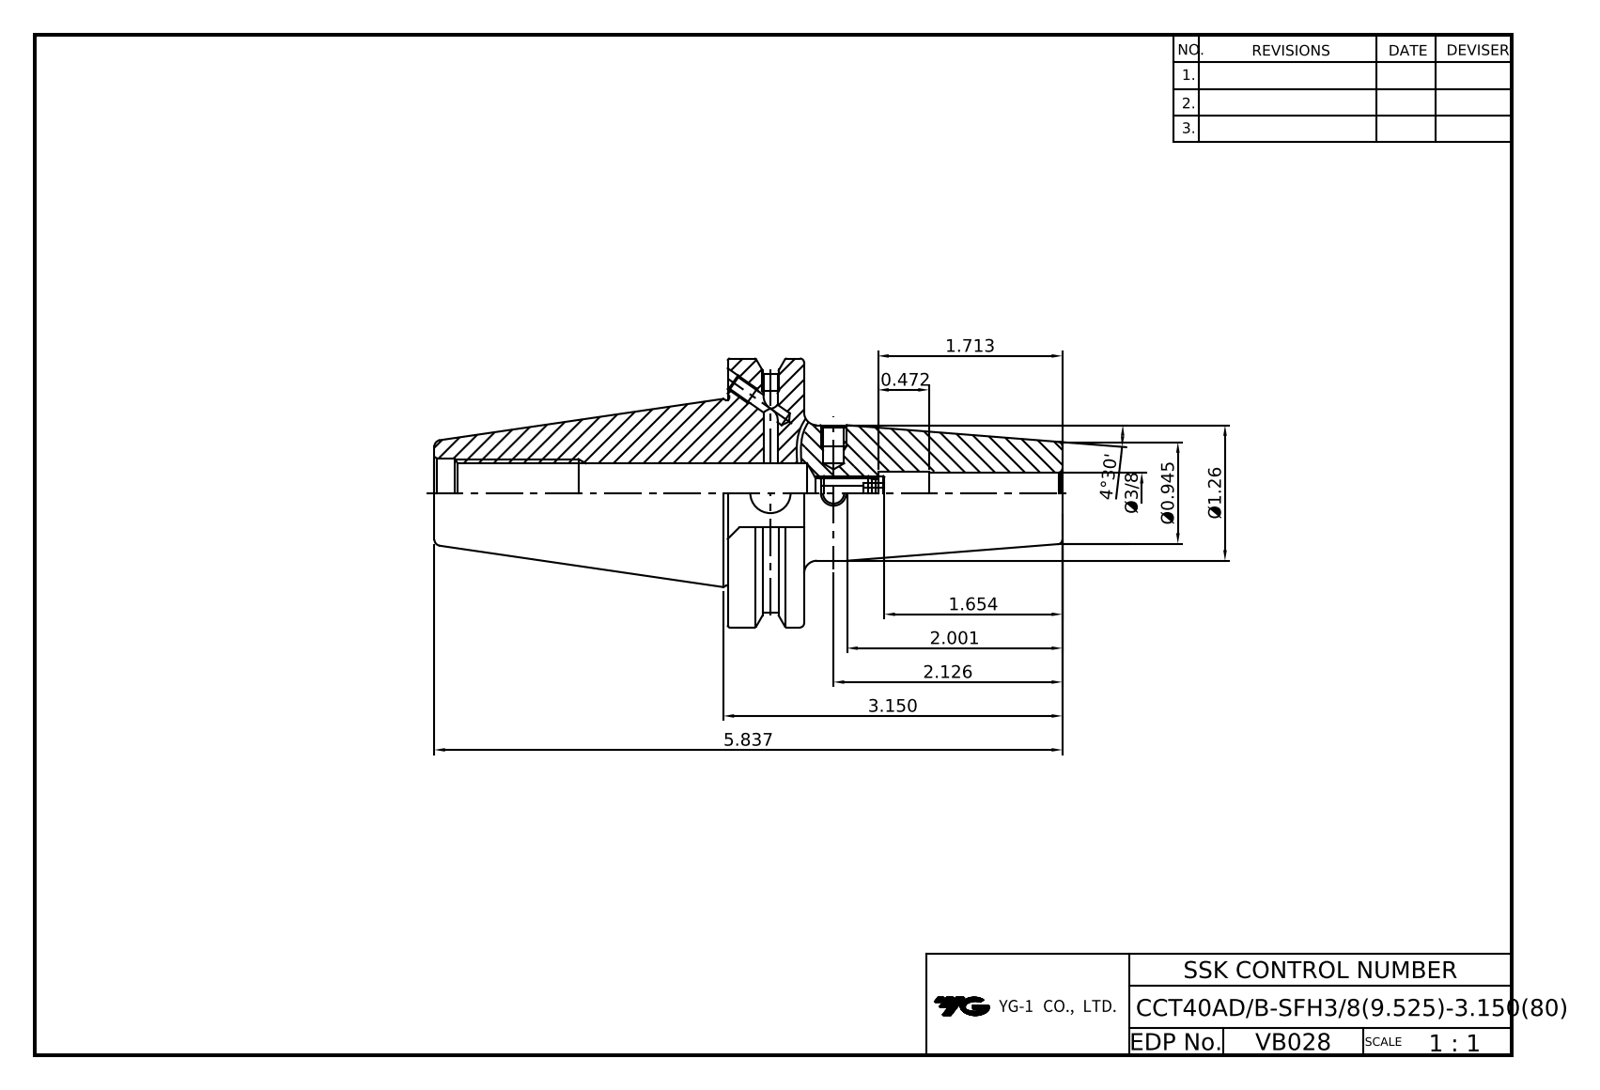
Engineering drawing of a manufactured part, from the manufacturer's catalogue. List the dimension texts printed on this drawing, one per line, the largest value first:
5.837
4°30'
3.150
2.126
2.001
1.713
1.654
Ø1.26
Ø0.945
0.472
